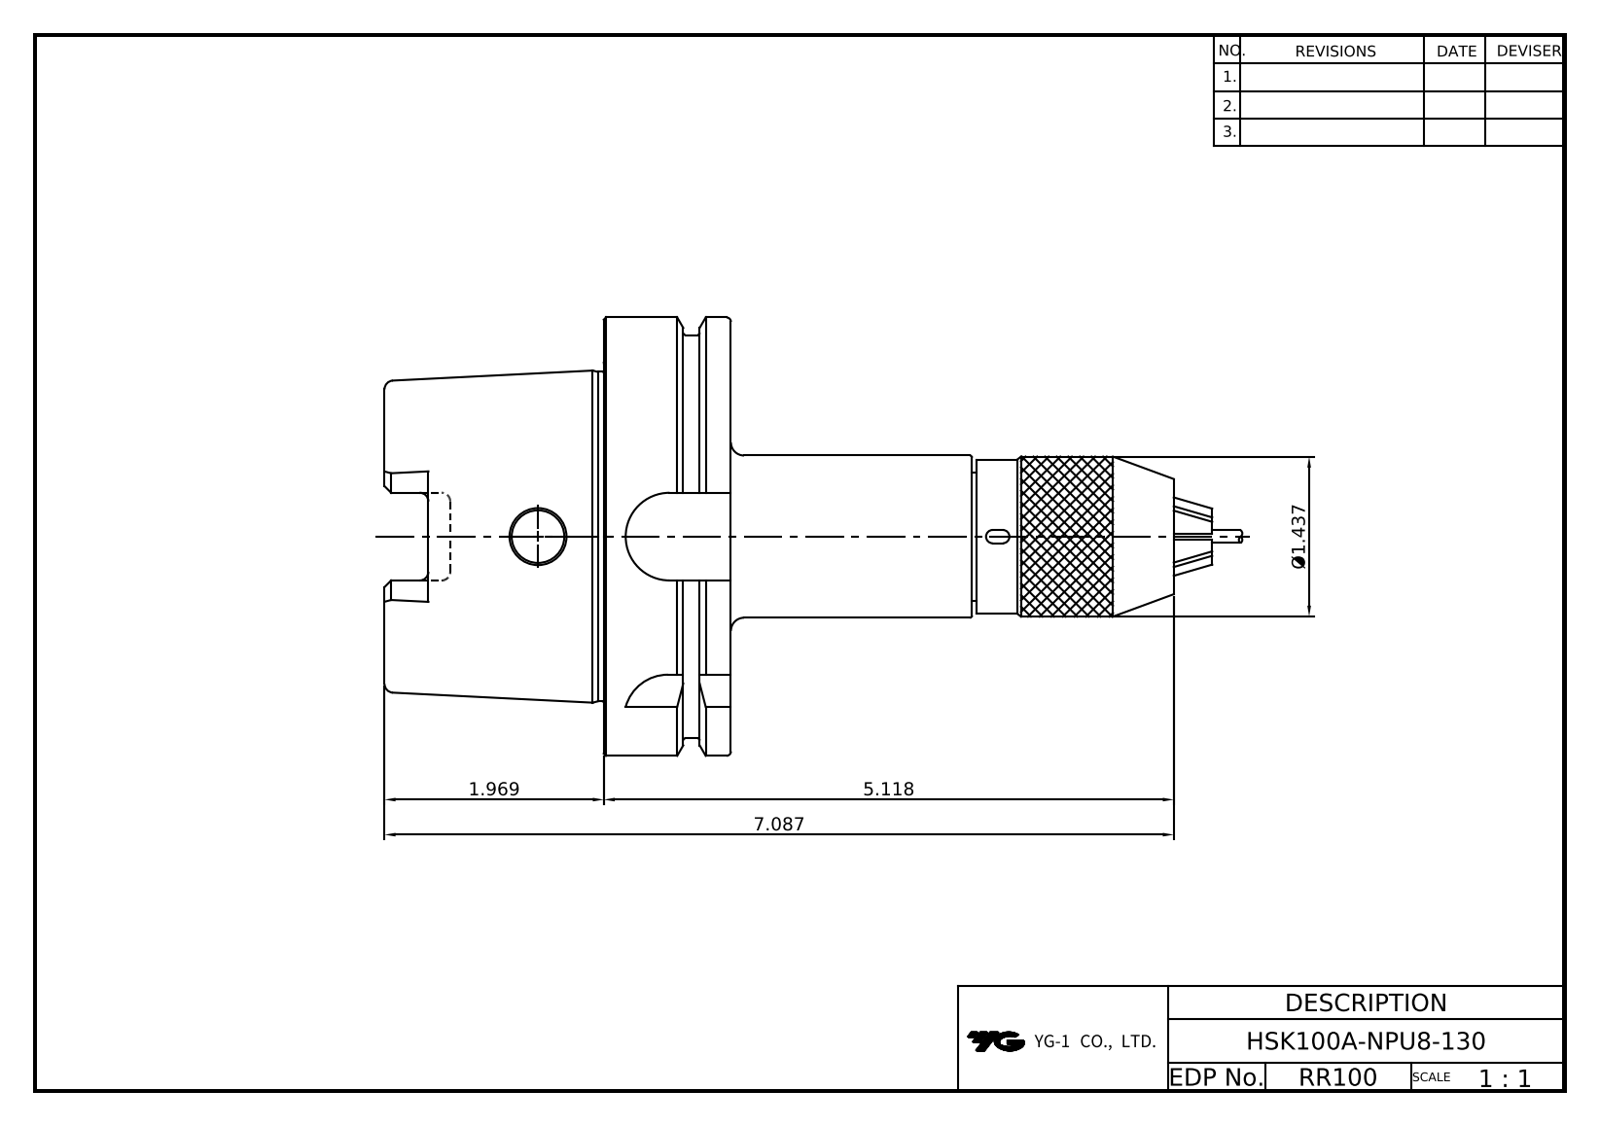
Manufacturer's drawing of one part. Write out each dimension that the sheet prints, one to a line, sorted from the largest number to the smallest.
7.087
5.118
1.969
Ø1.437
